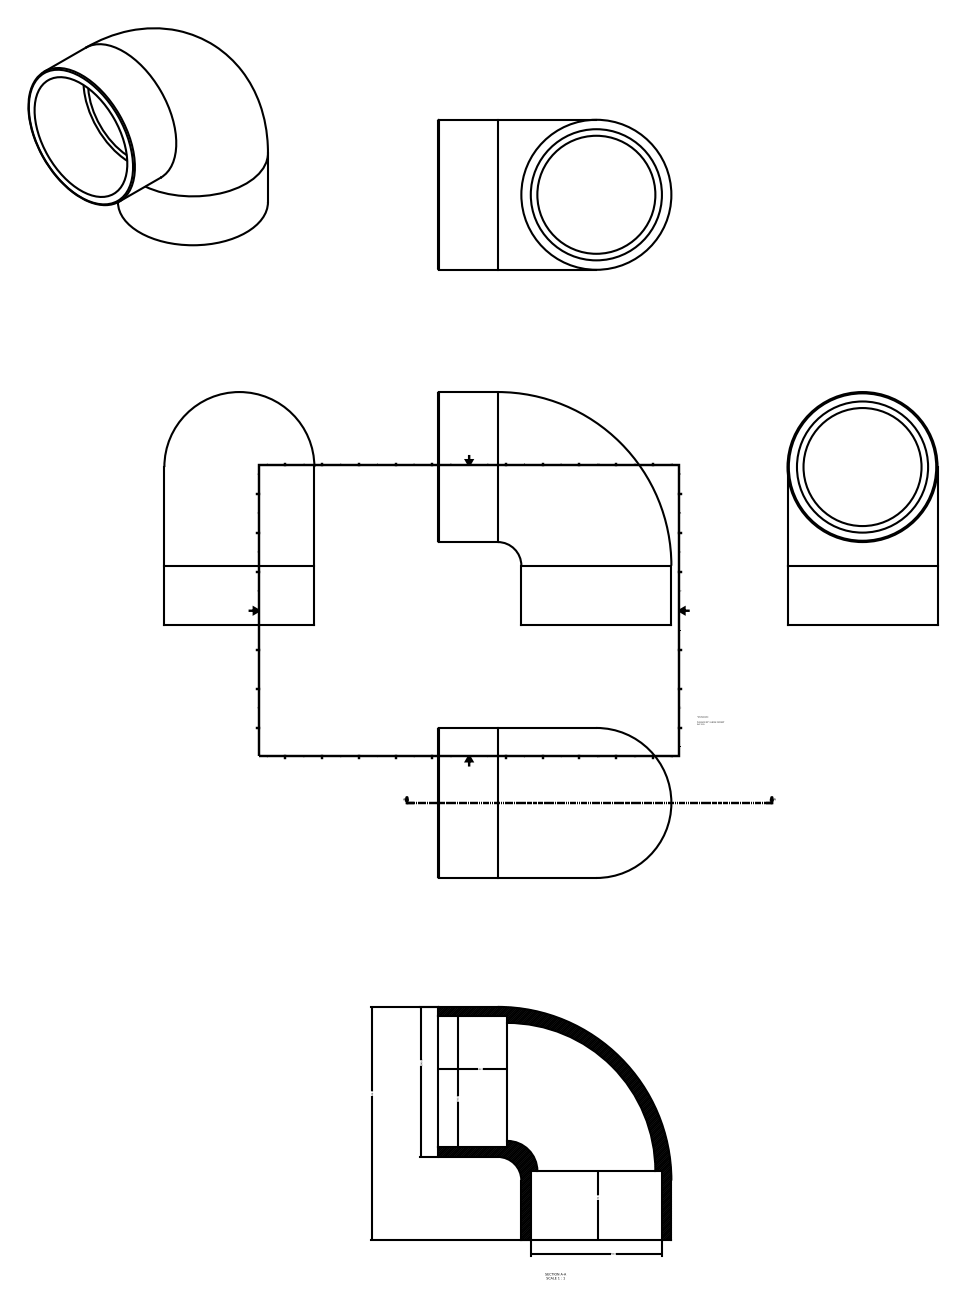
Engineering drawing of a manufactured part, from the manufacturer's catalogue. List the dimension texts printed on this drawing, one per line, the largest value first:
445.00
286.00
250.00
250.00
132.00
132.00
